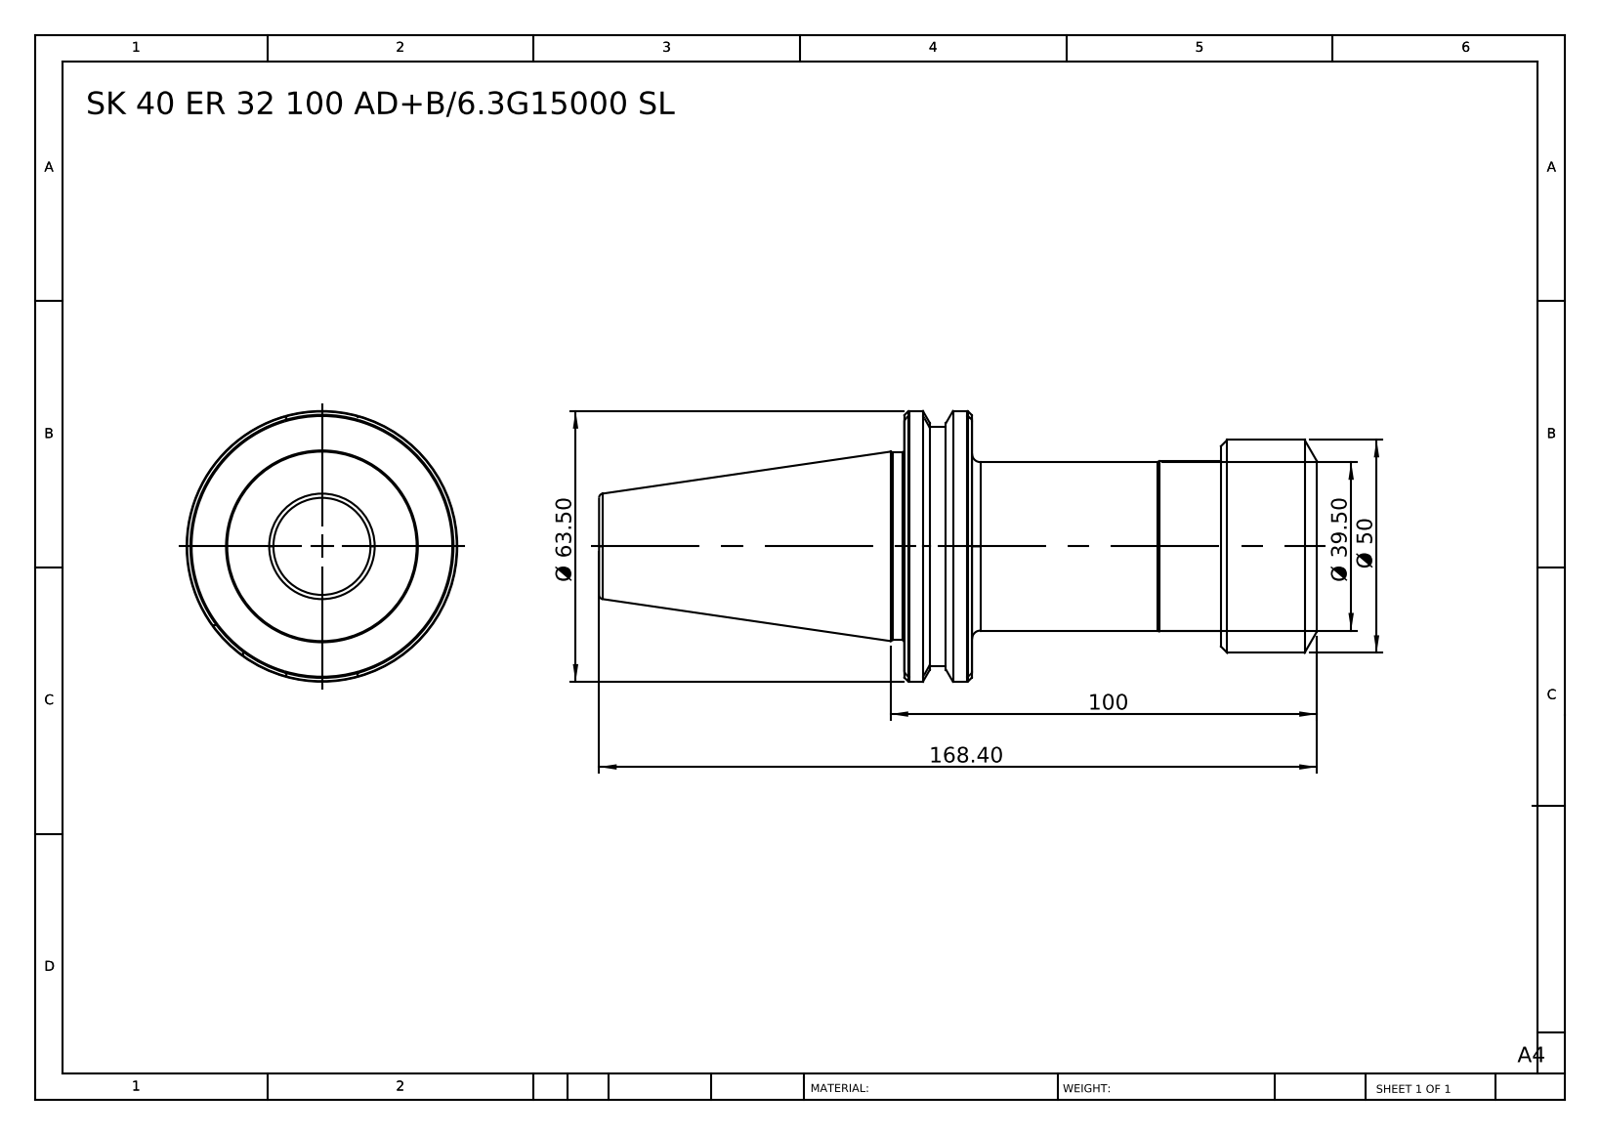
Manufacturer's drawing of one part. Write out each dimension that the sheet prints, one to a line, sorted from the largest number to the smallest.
168.40
100
Ø 63.50
Ø 50
Ø 39.50
